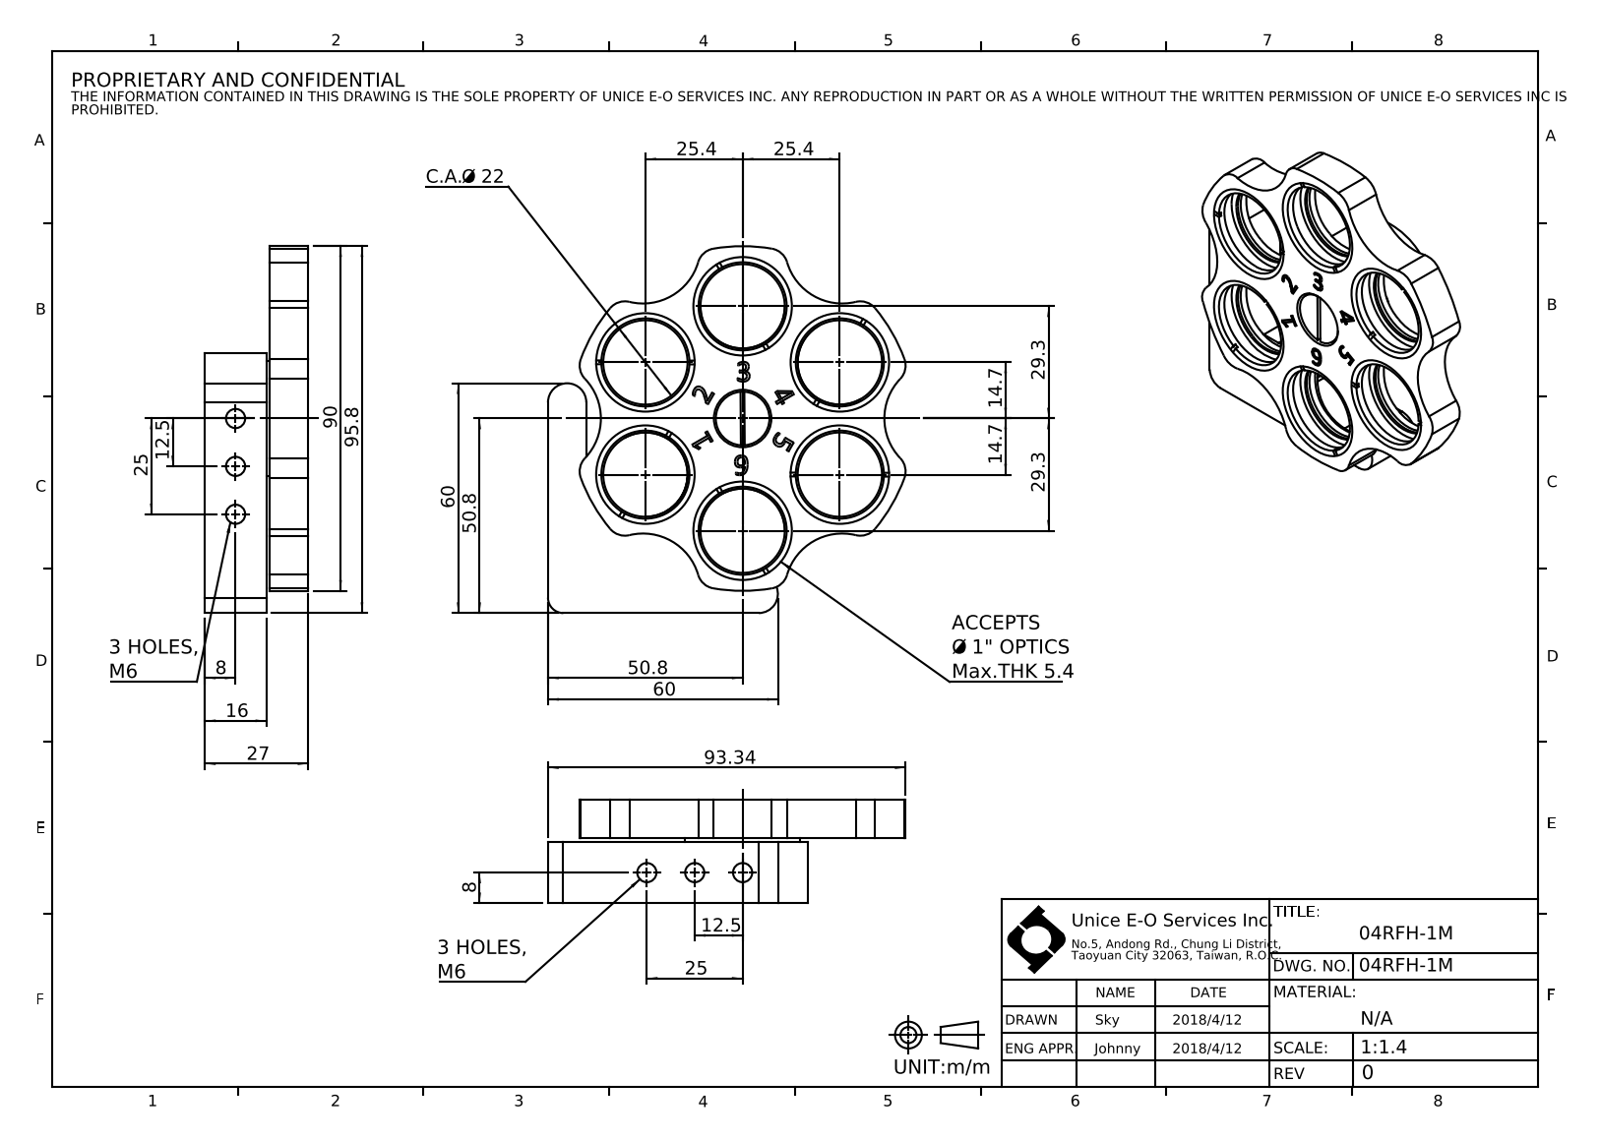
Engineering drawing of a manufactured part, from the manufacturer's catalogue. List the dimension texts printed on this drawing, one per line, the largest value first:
95.8
93.34
90
60
60
50.8
50.8
29.3
29.3
27
25.4
25.4
25
25
C.A. Ø 22
16
14.7
14.7
12.5
12.5
8
8
